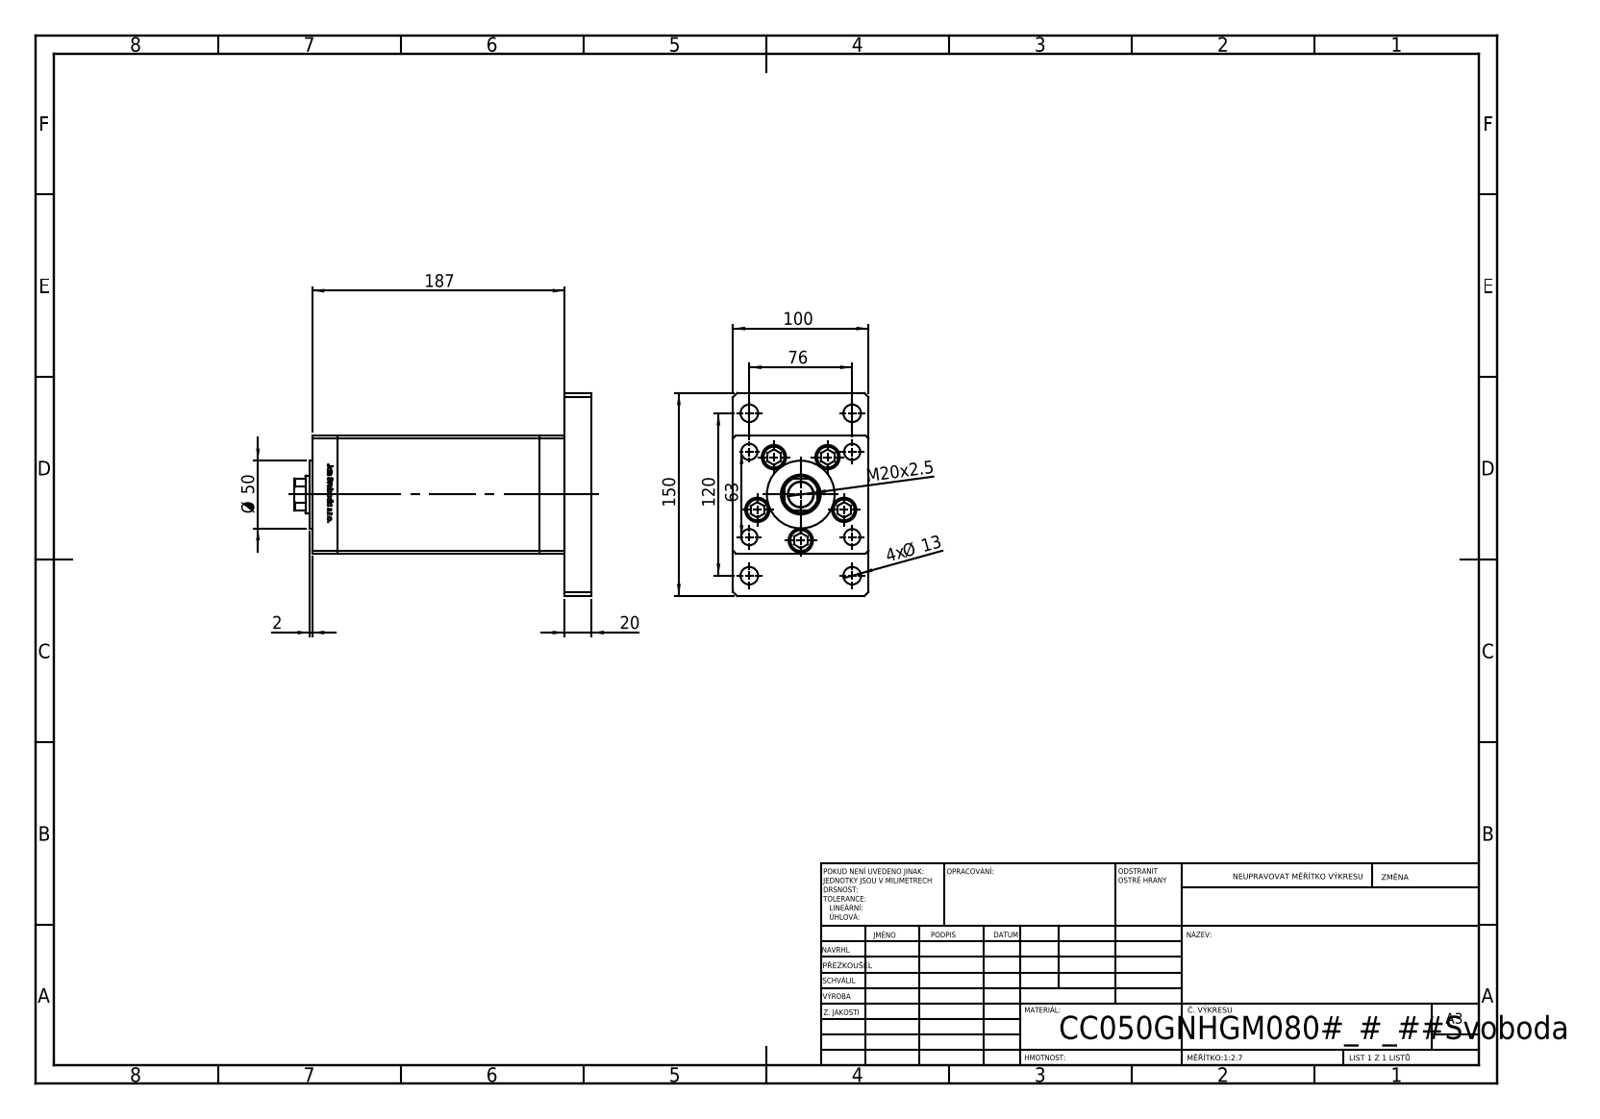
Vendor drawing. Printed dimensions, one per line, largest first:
187
150
120
100
76
63
Ø 50
20
M20x2.5
4x Ø 13
2
